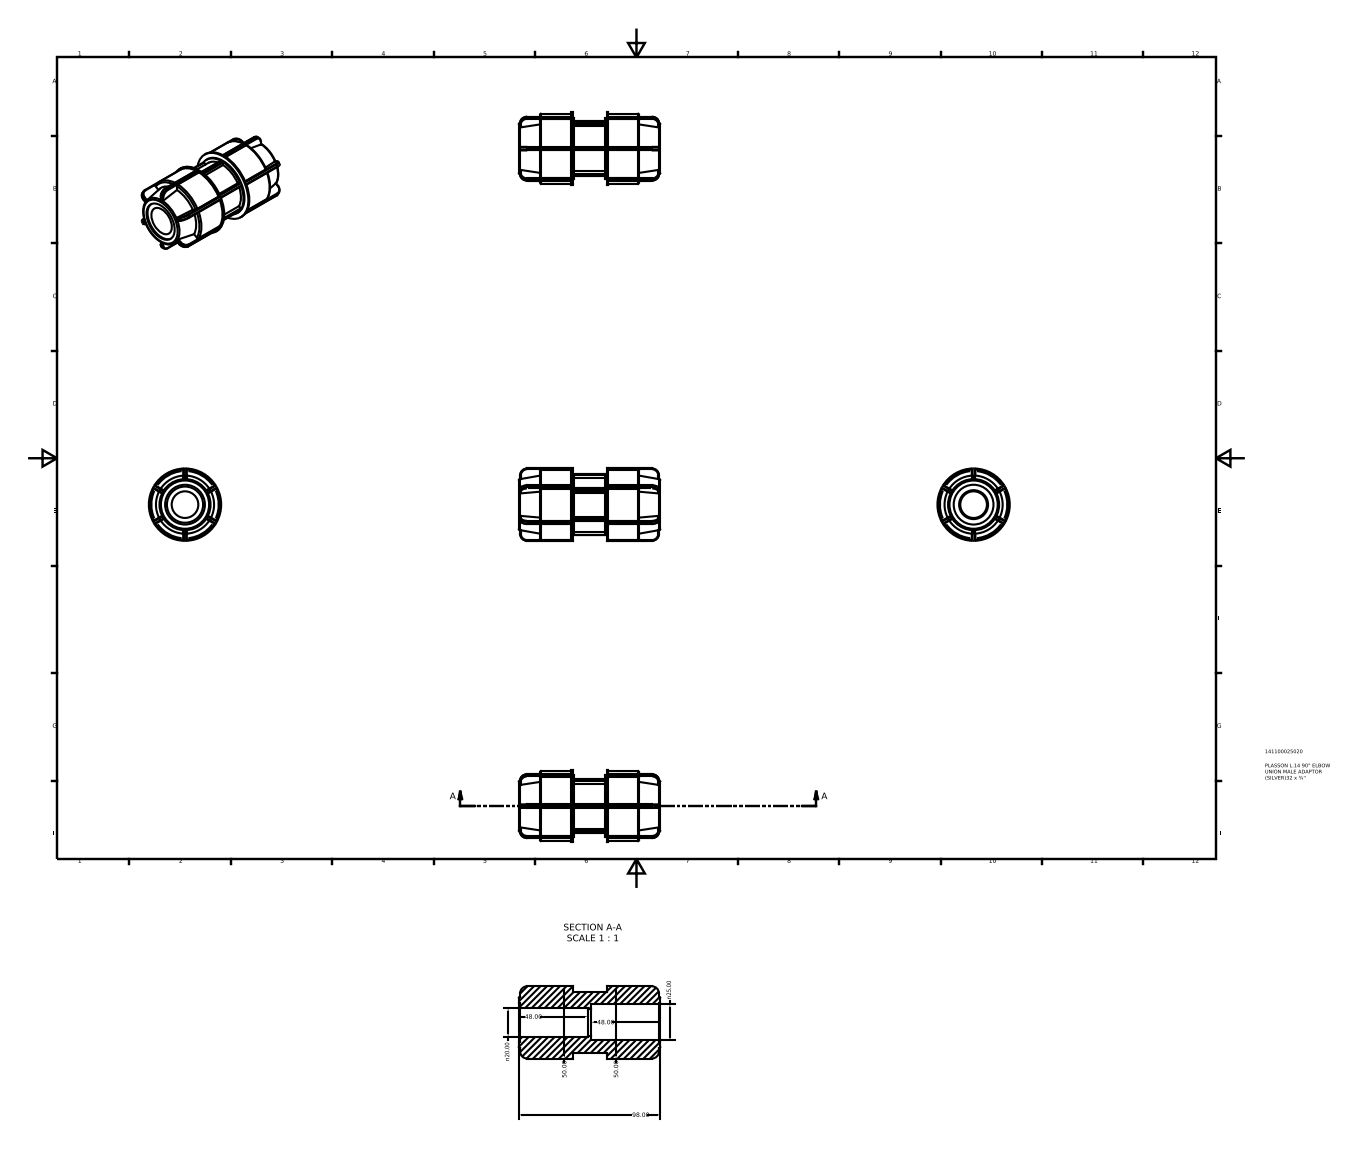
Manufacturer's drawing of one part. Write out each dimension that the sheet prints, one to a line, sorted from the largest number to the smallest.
98.00
50.00
50.00
48.00
48.00
n25.00
n20.00
